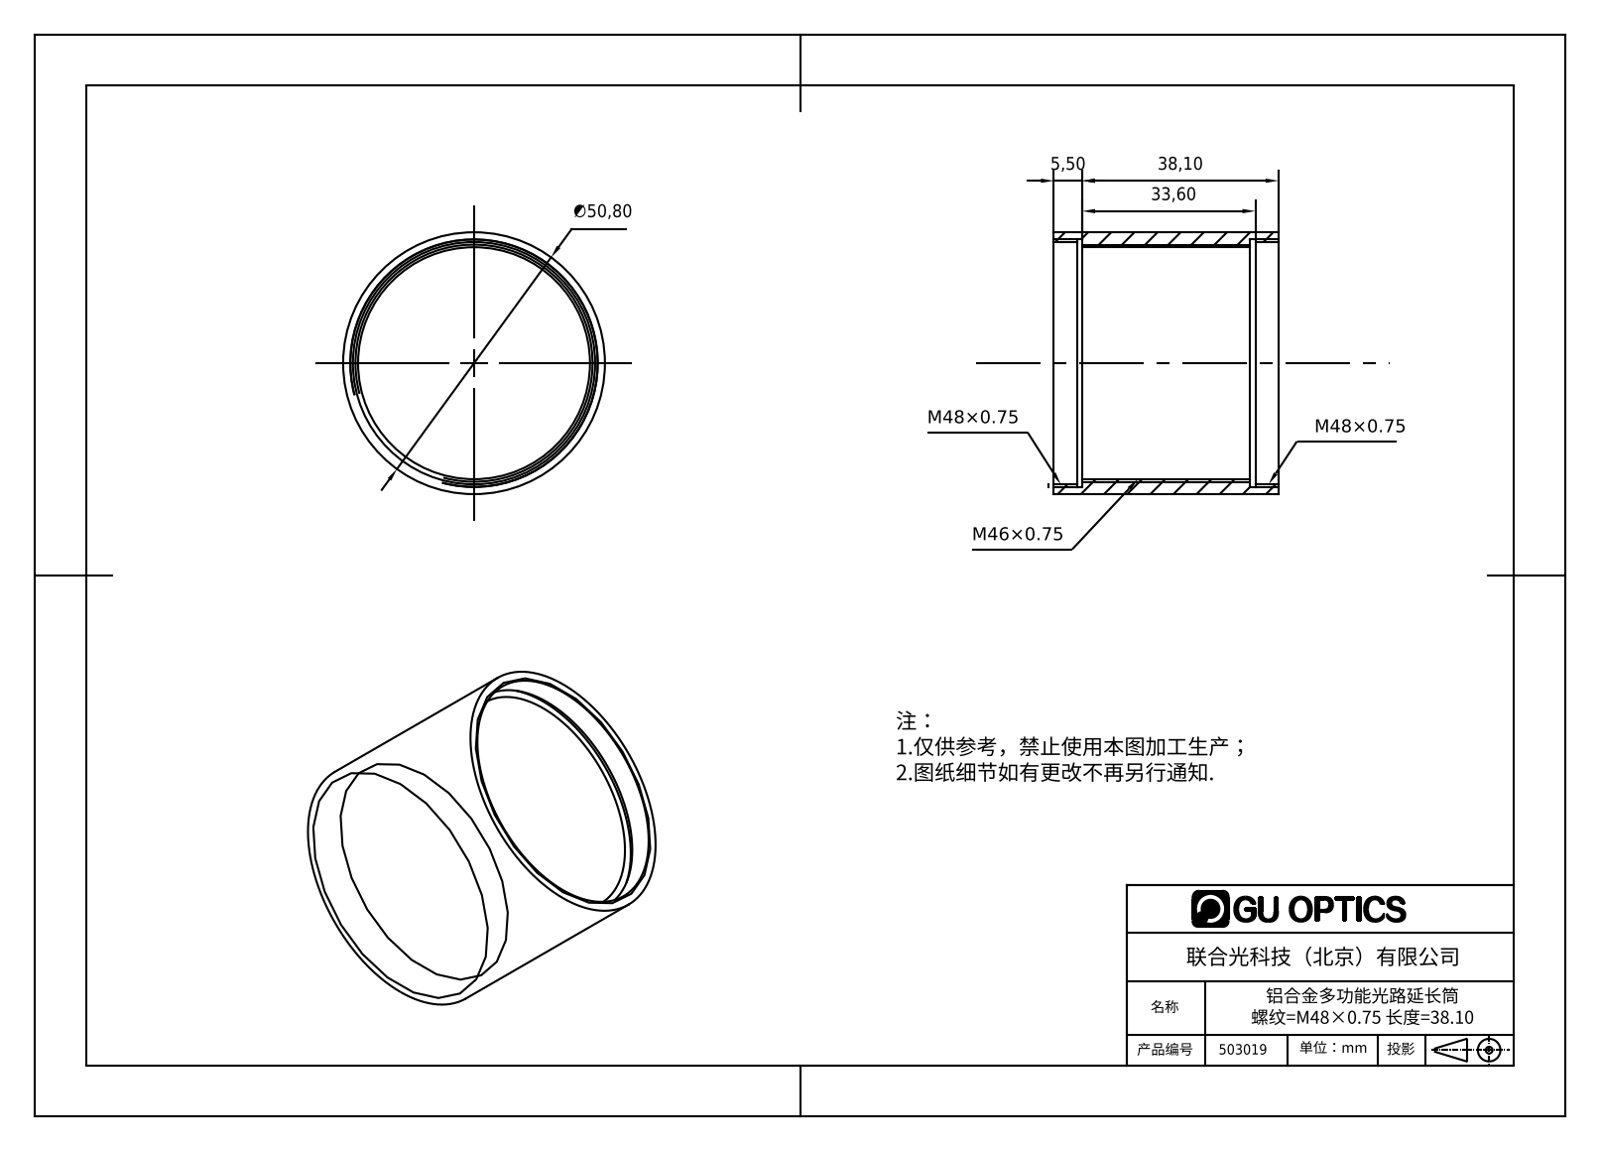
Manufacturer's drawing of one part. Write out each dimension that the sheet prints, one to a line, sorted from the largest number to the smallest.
∅50,80
38,10
33,60
5,50
